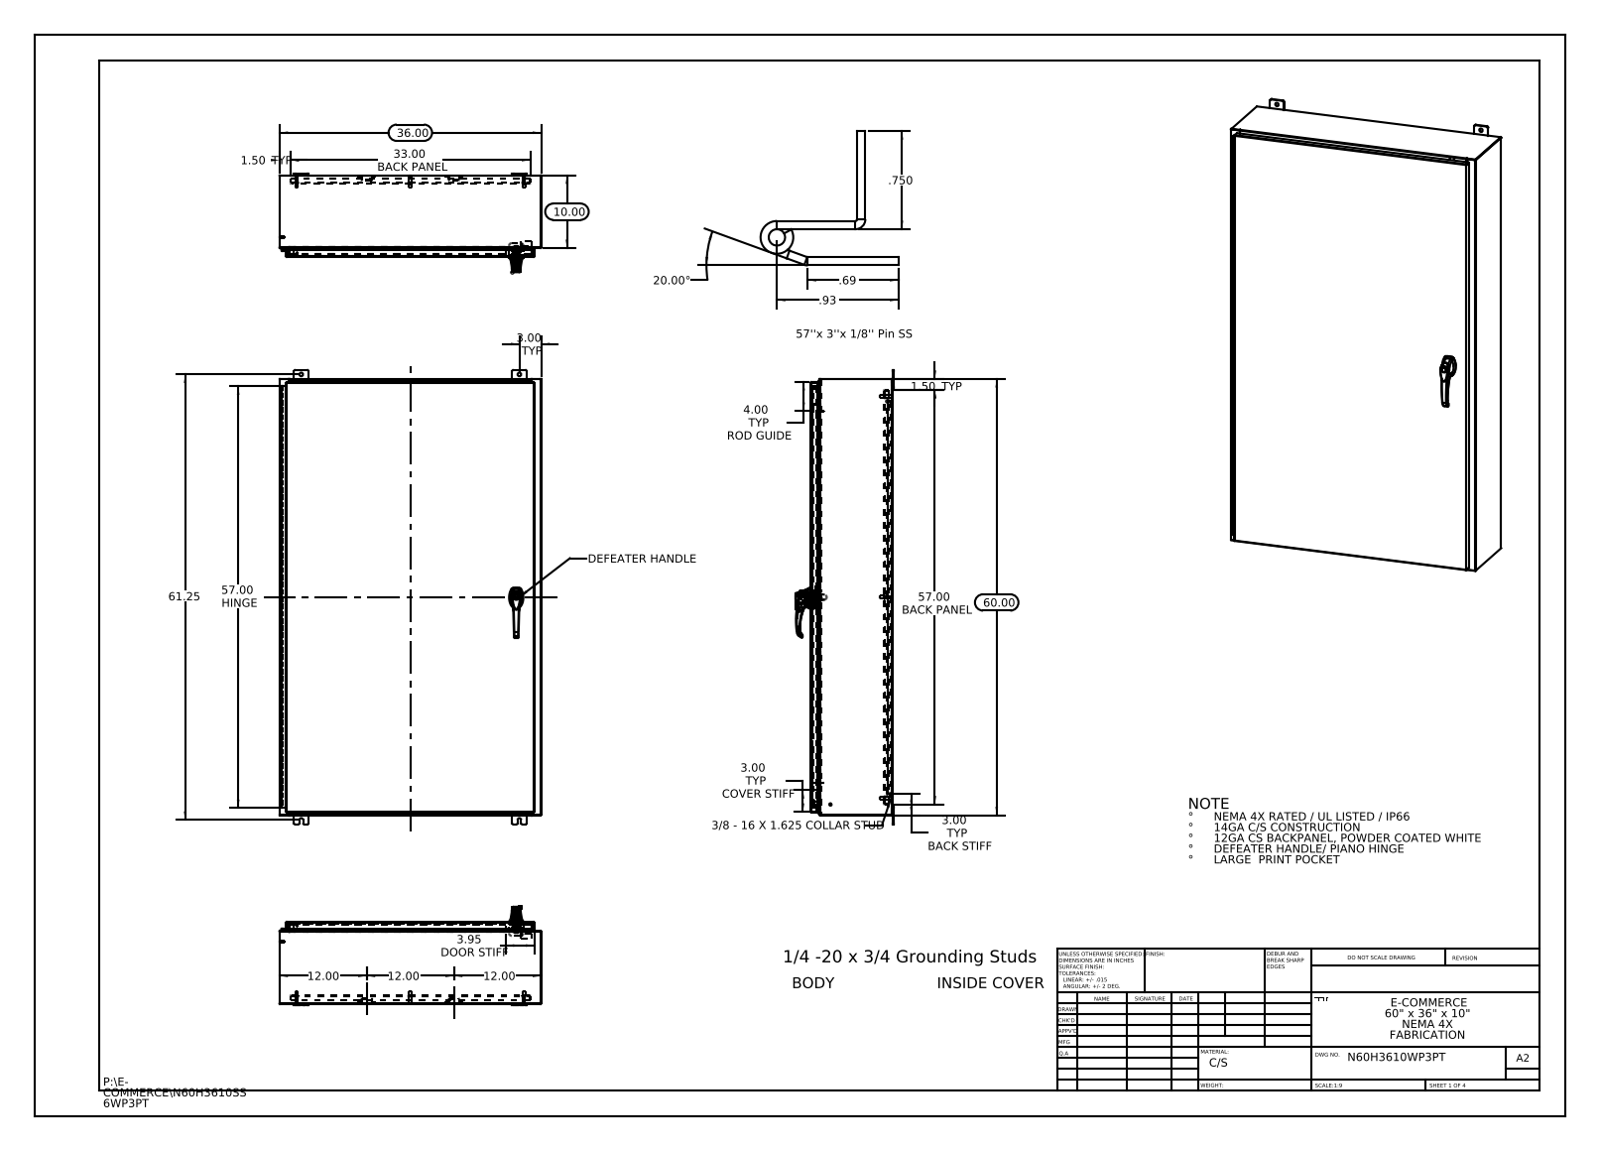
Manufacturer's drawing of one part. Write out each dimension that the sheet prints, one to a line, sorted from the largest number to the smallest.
61.25
60.00
57.00 HINGE
57.00 BACK PANEL
36.00
33.00 BACK PANEL
20.00°
12.00
12.00
12.00
10.00
4.00 TYP ROD GUIDE
3.95 DOOR STIFF
3.00 TYP
3.00 TYP COVER STIFF
3.00 TYP BACK STIFF
1.50 TYP
1.50 TYP
.93
.750
.69
